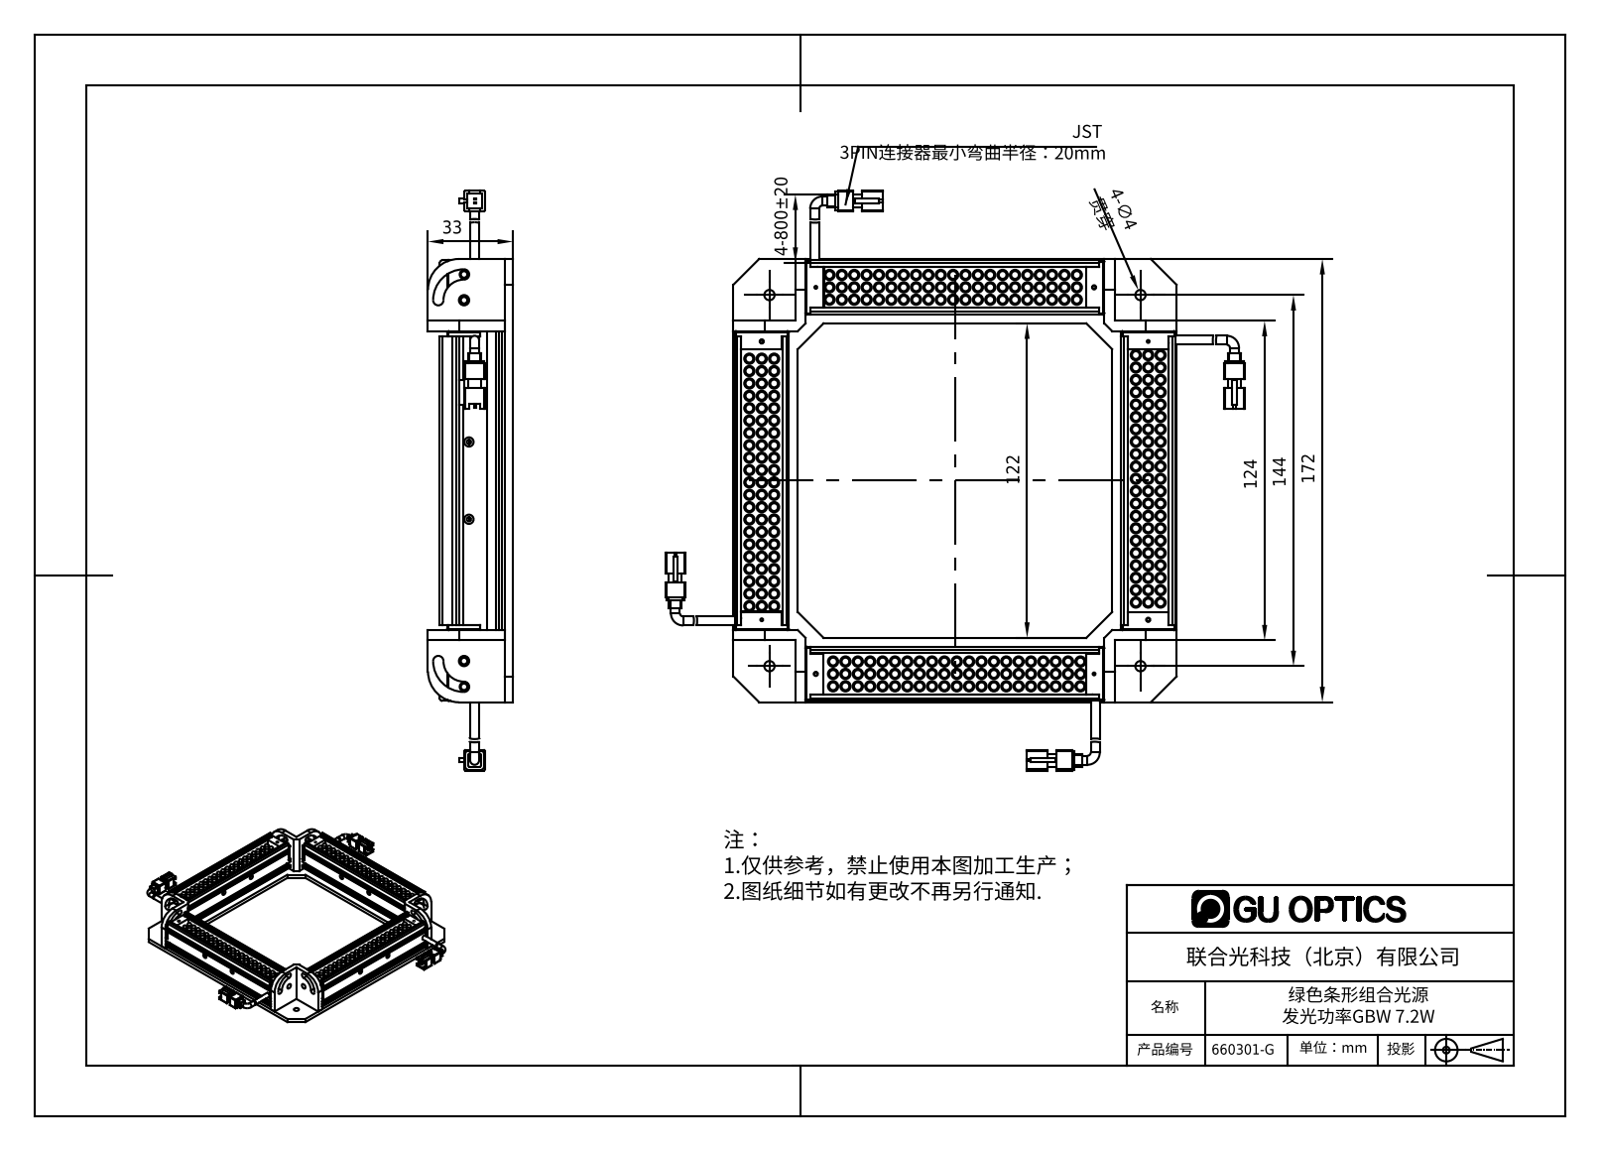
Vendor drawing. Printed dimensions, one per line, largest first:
172
144
124
122
33
4-800±20
4-∅4 贯穿
